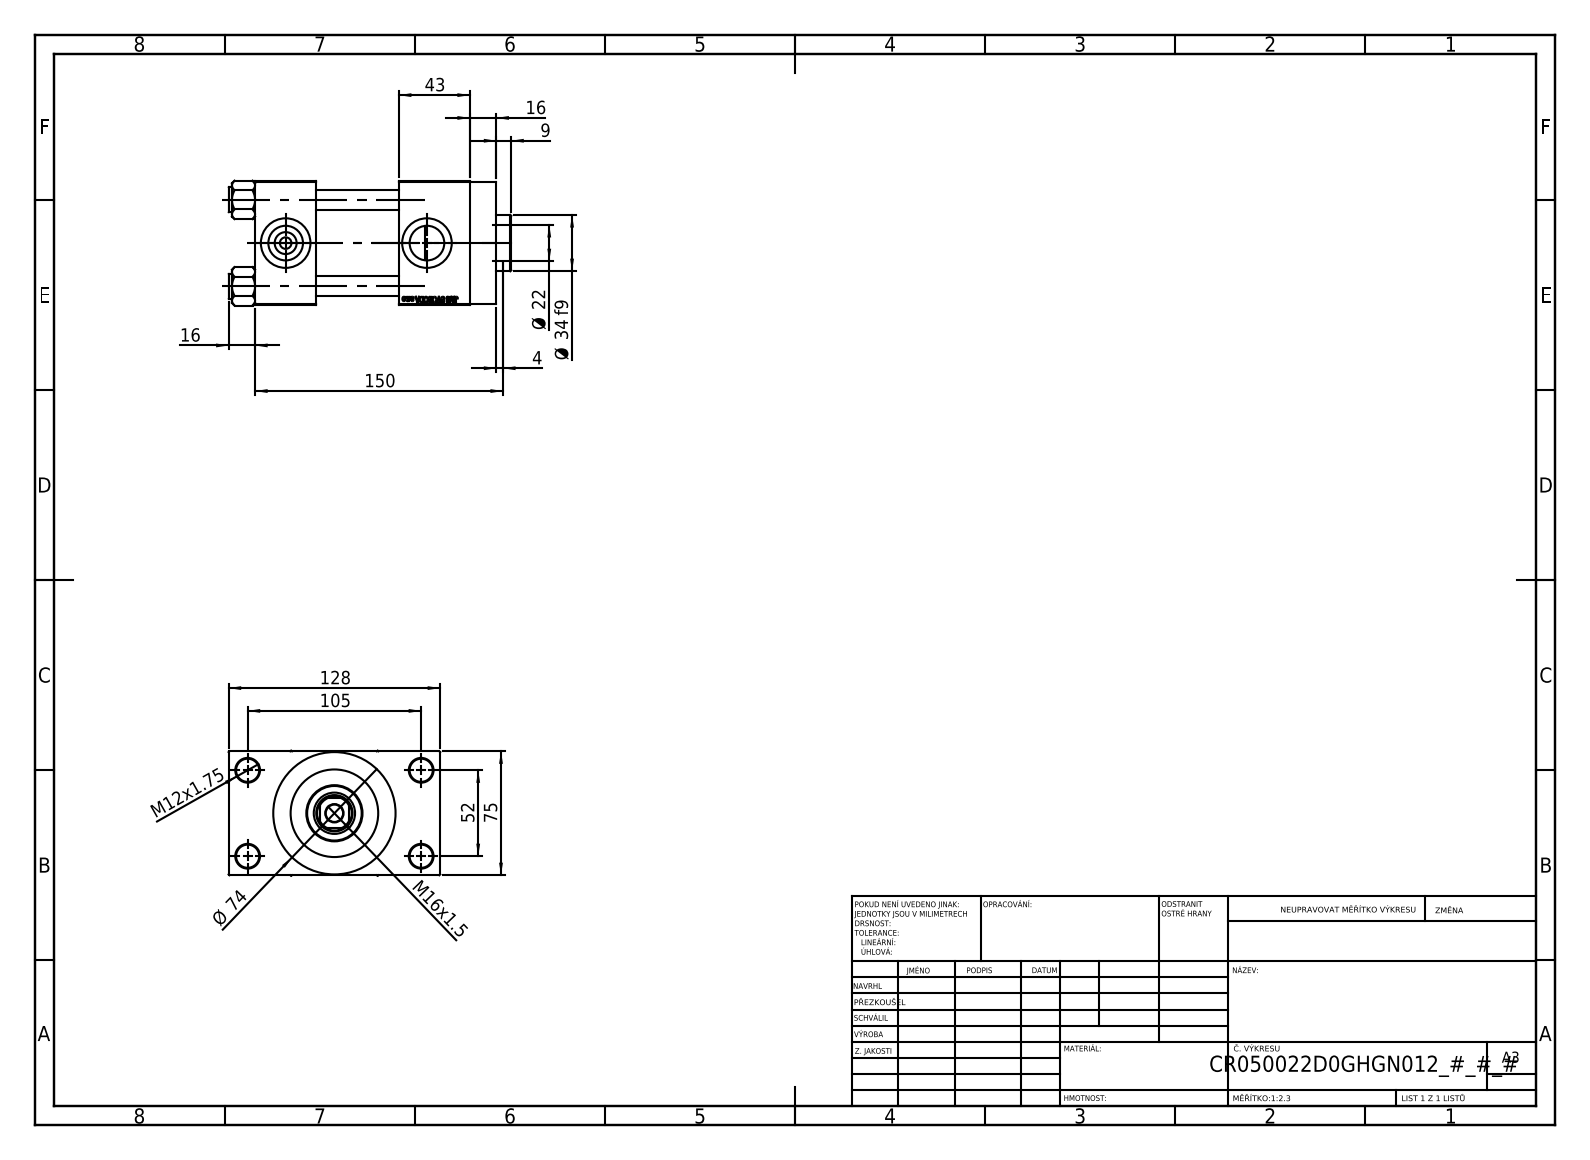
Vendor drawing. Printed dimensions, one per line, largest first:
150
128
105
75
Ø 74
52
43
Ø 34 f9
Ø 22
16
16
M16x1.5
M12x1.75
9
4
